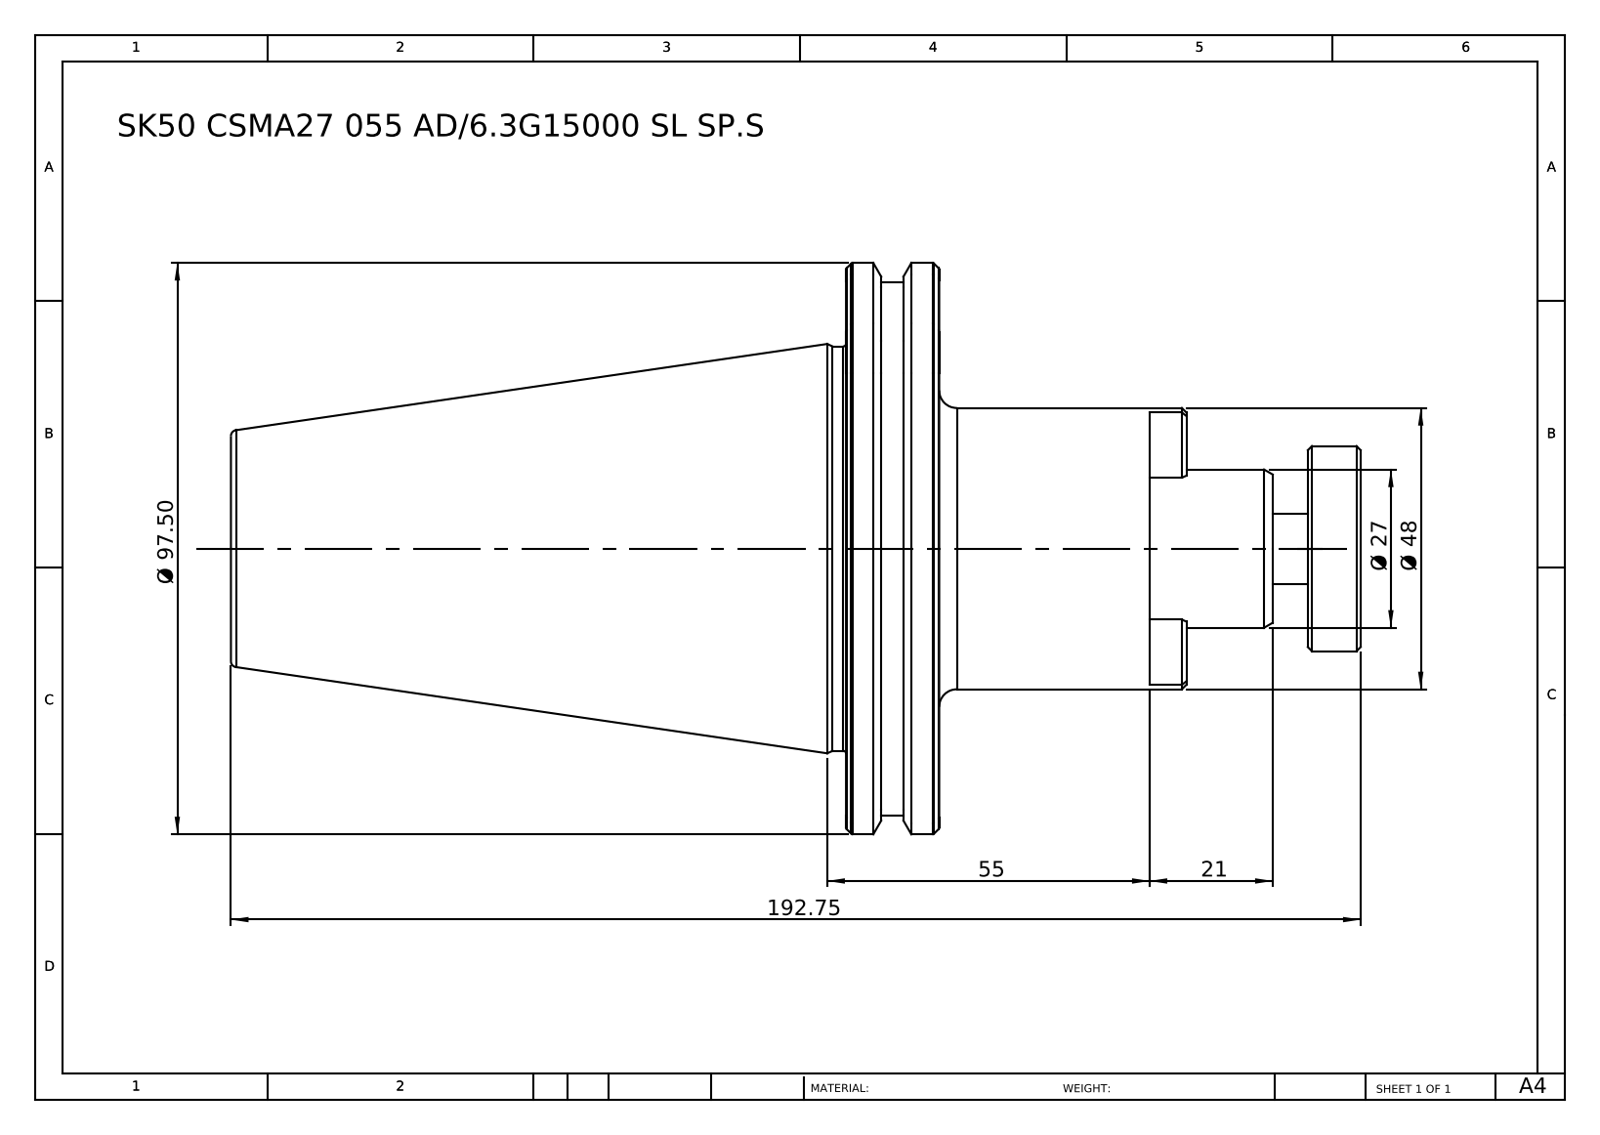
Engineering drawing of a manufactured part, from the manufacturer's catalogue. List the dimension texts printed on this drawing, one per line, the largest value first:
192.75
Ø 97.50
55
Ø 48
Ø 27
21
